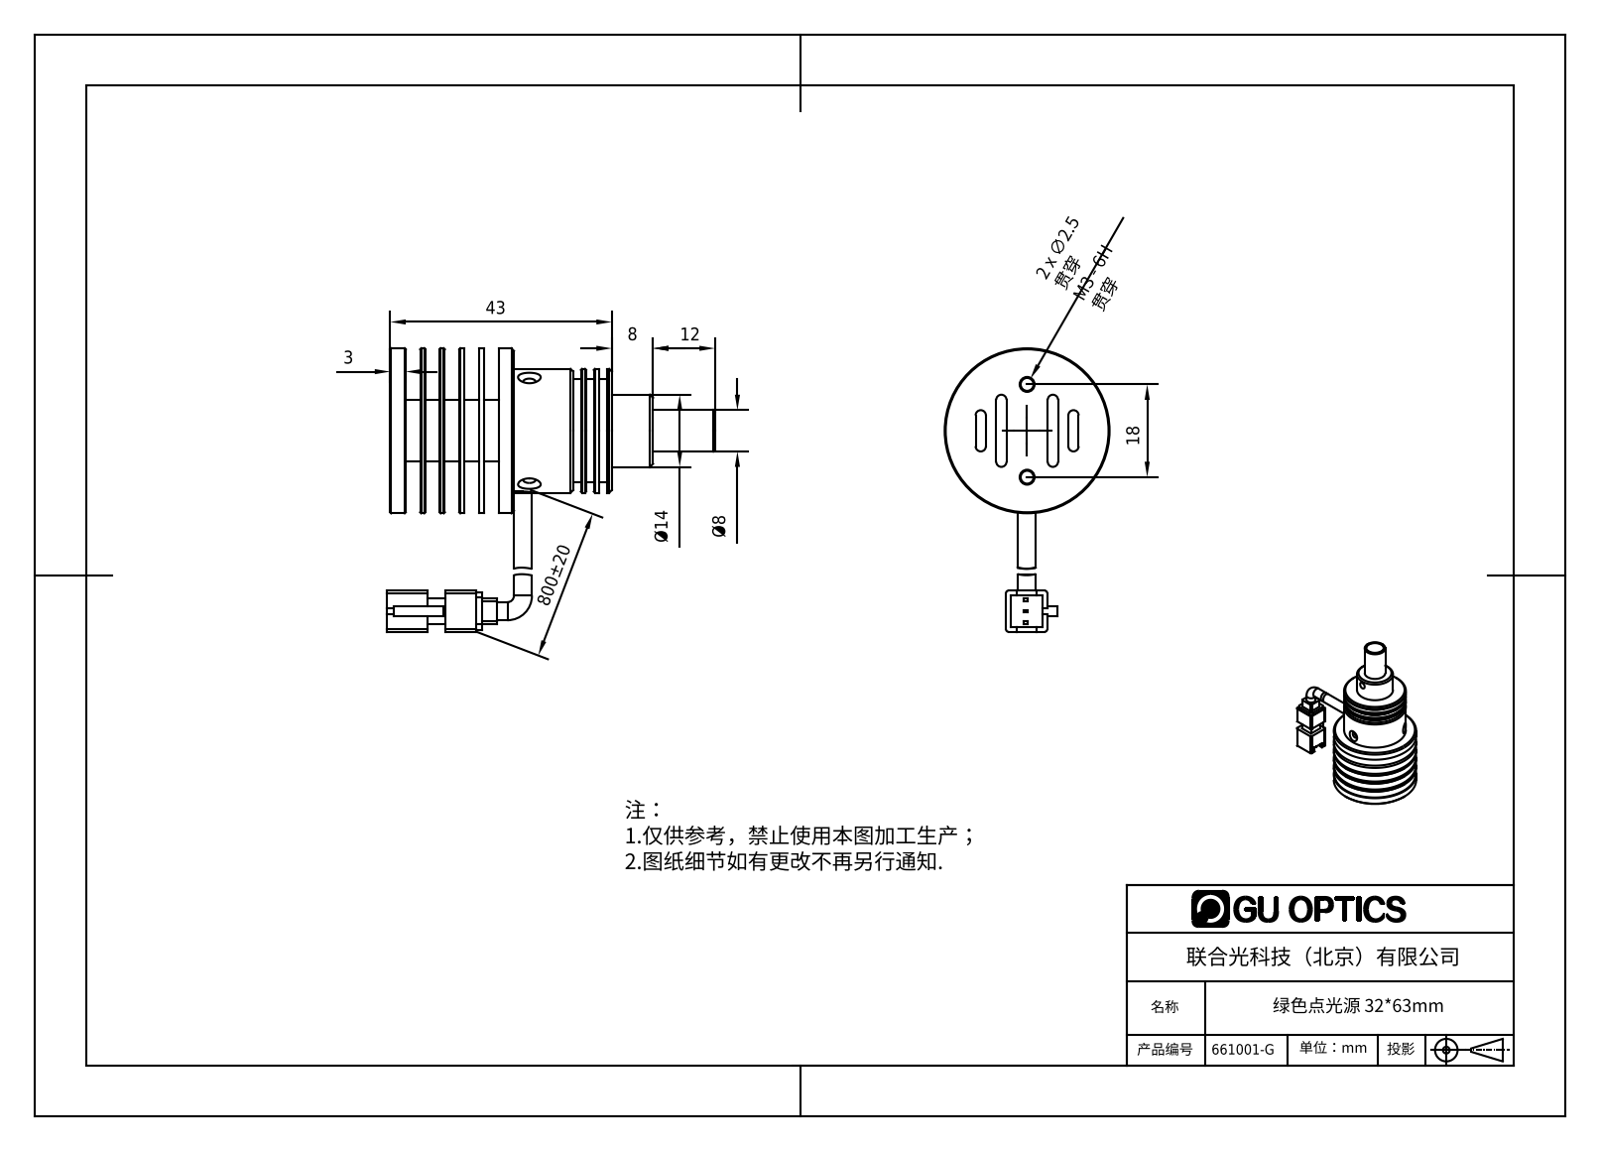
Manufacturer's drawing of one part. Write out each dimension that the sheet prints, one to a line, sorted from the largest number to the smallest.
800±20
43
18
Ø14
12
Ø8
8
3
2 x ∅2.5 贯穿 M3 - 6H 贯穿
